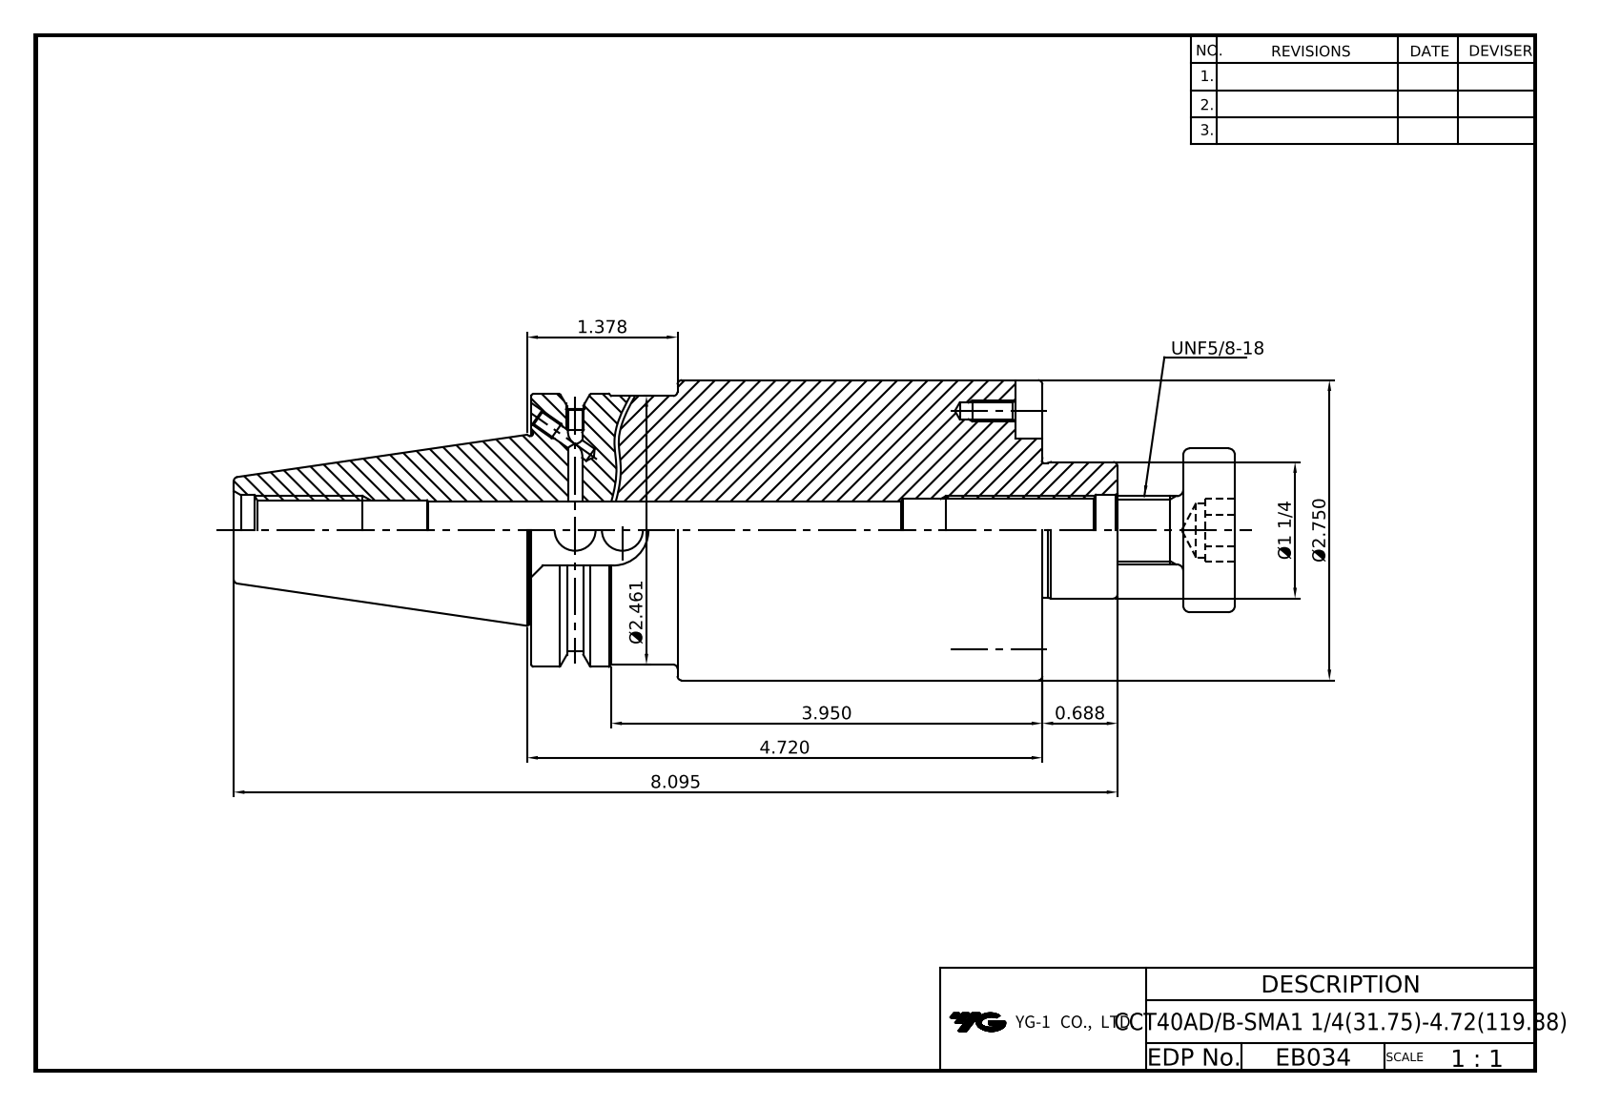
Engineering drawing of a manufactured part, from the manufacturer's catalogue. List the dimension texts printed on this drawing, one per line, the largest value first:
8.095
4.720
3.950
Ø2.750
Ø2.461
1.378
Ø1 1/4
0.688
